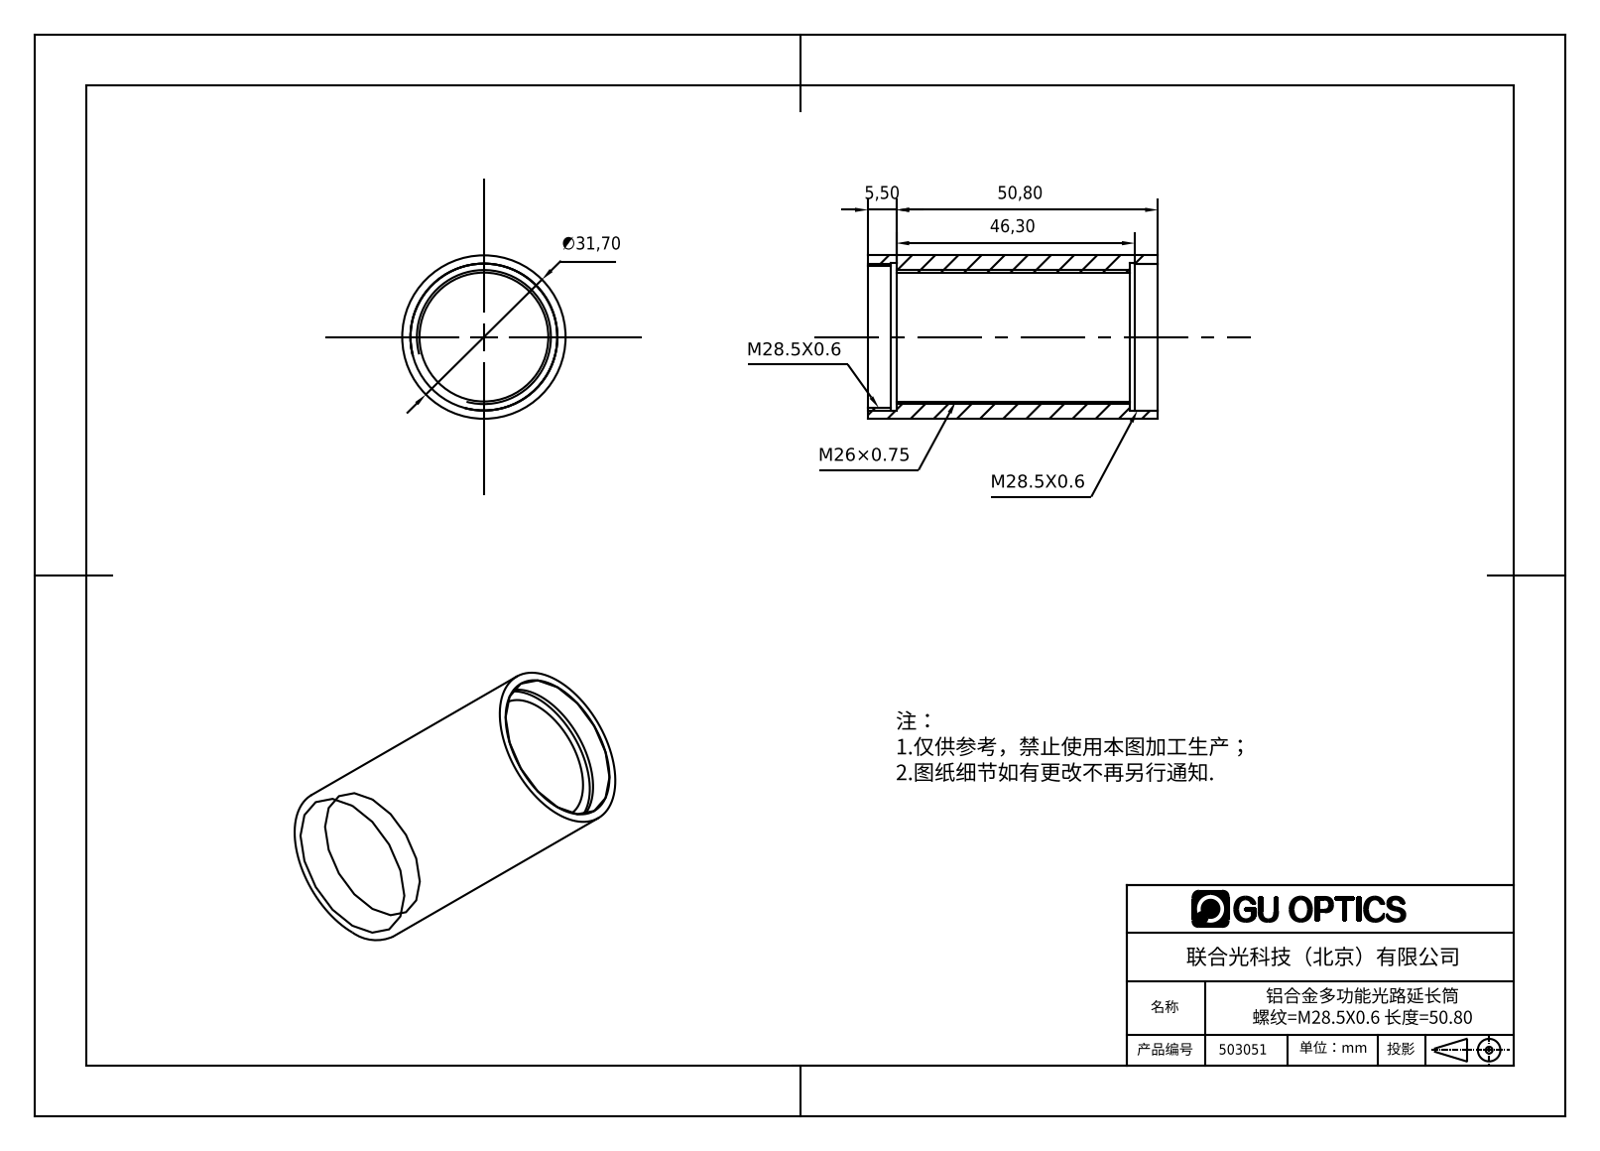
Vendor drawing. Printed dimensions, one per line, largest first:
50,80
46,30
∅31,70
5,50
